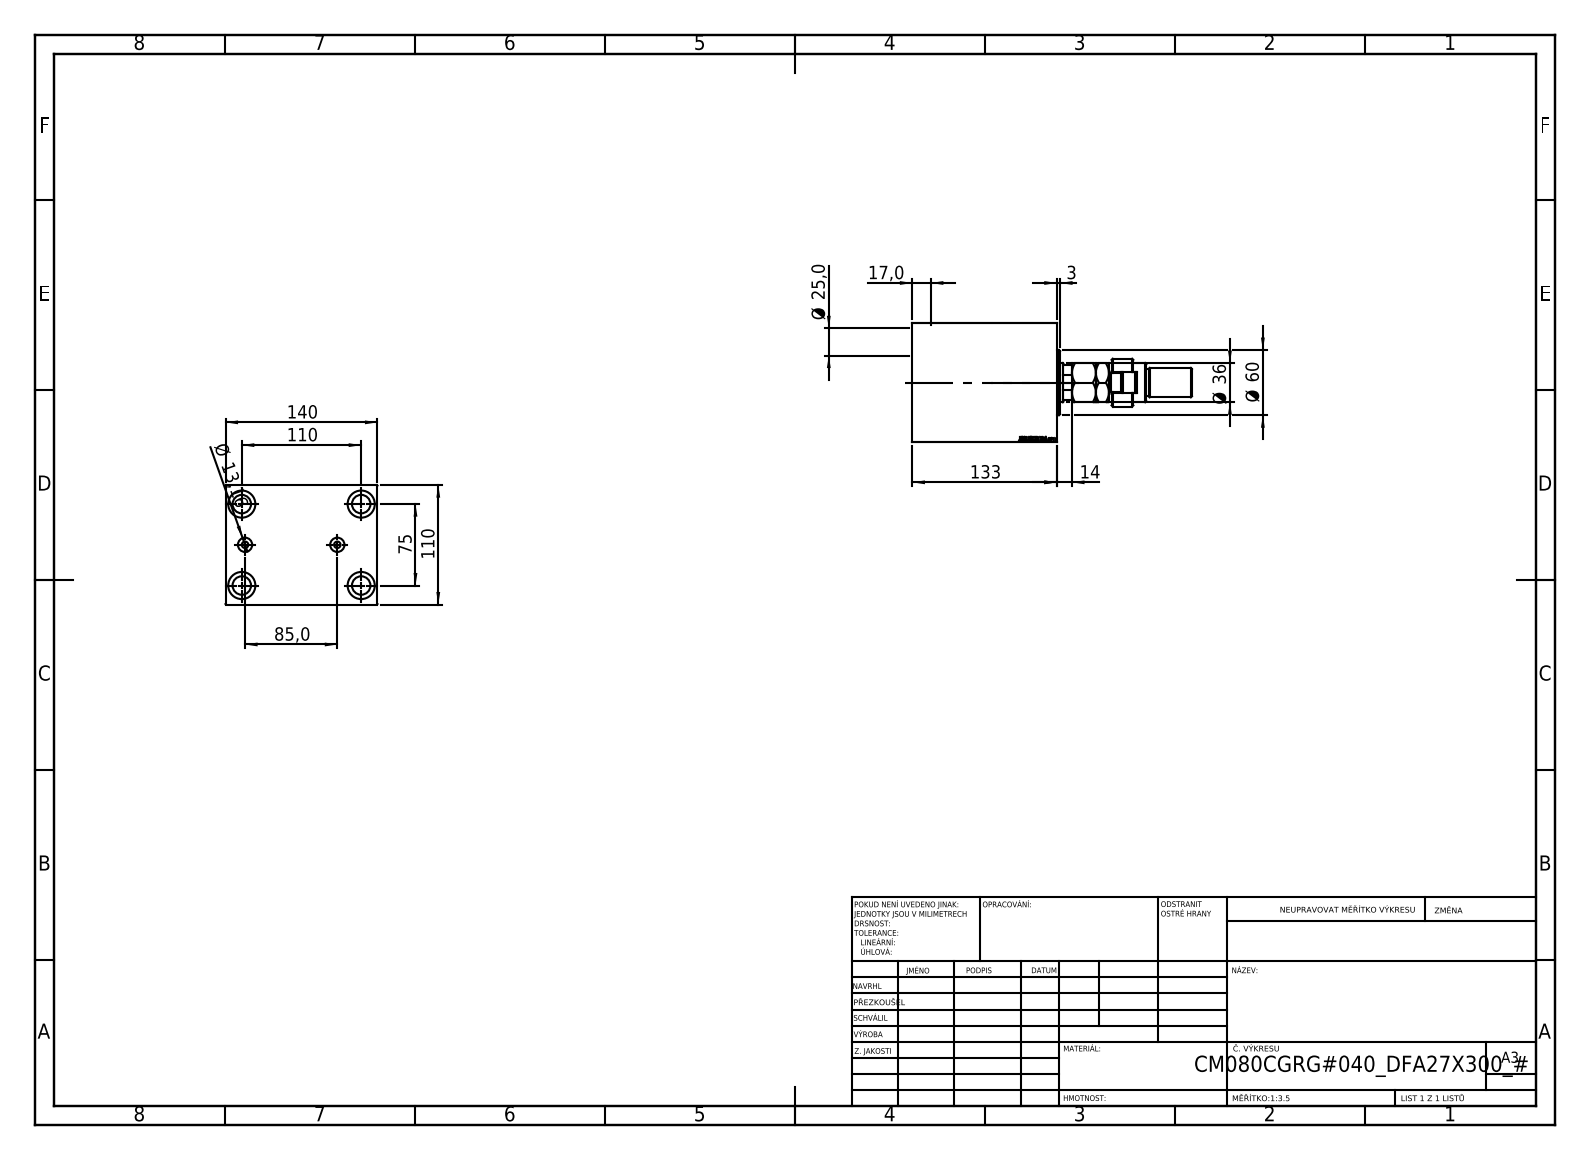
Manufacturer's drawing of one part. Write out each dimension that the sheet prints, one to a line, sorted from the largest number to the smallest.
140
133
110
110
85,0
75
Ø 60
Ø 36
Ø 25,0
17,0
14
Ø 13,16
3
